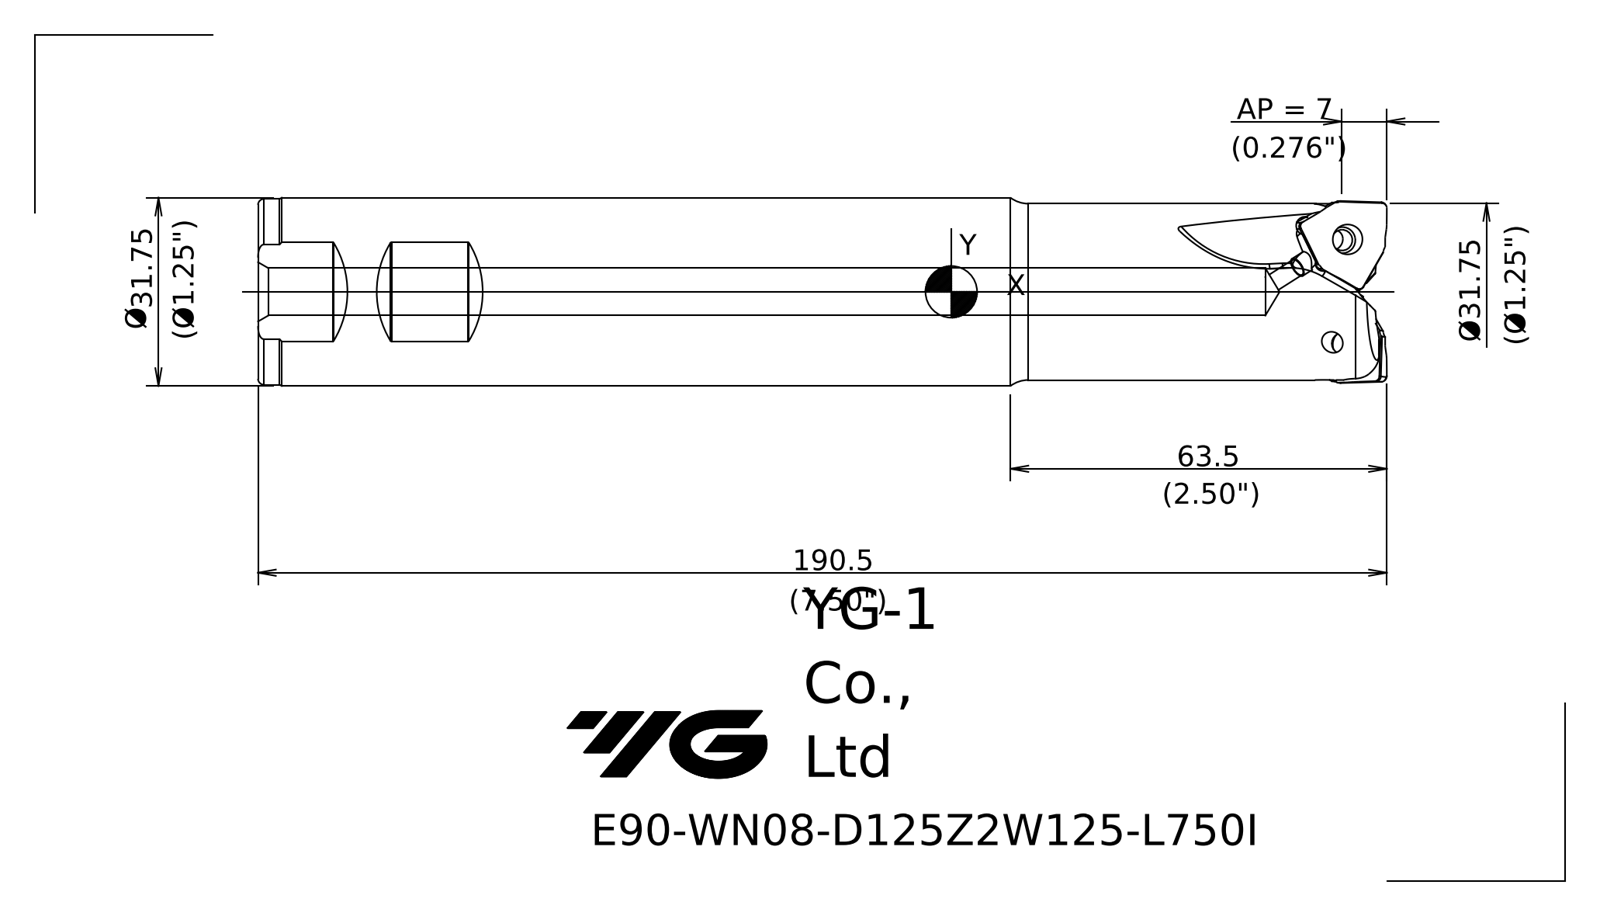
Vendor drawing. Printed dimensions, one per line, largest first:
Ø 31.75
Ø31.75
AP = 7
